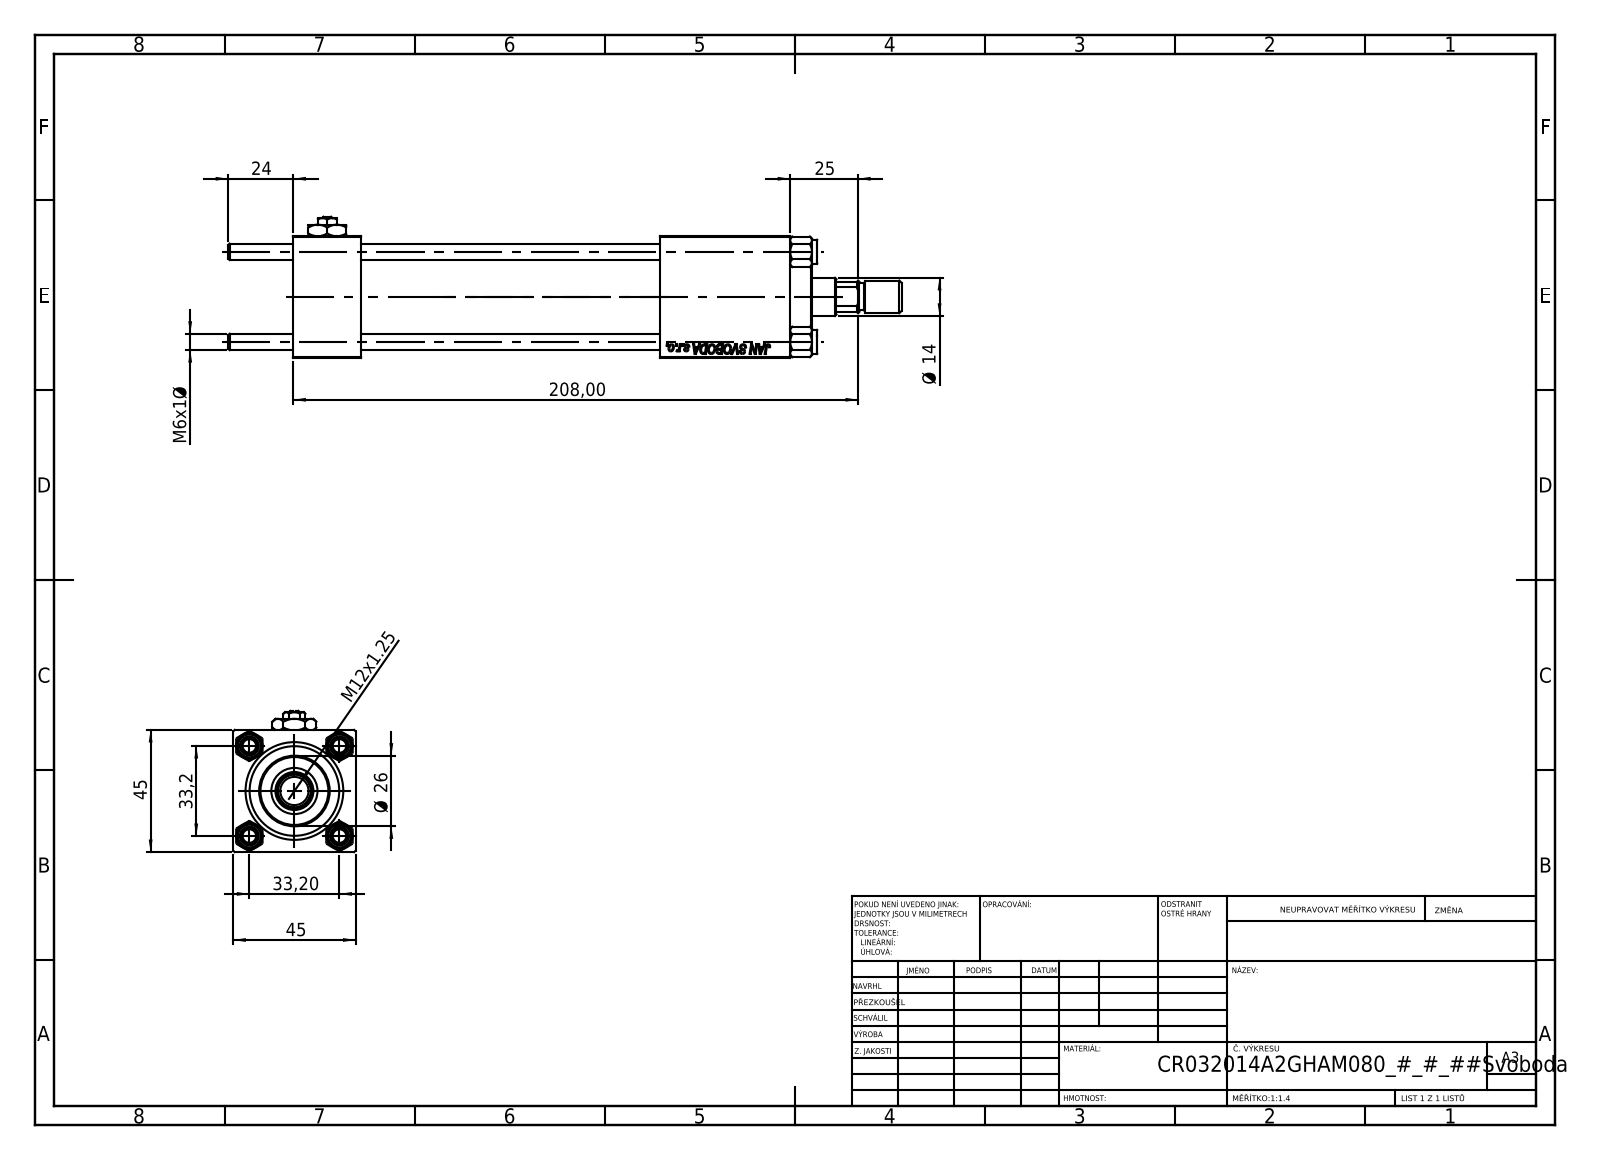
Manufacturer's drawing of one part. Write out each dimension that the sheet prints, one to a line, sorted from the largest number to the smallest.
208,00
45
45
33,2
33,20
Ø 26
25
24
Ø 14
M12x1.25
M6x1 Ø
